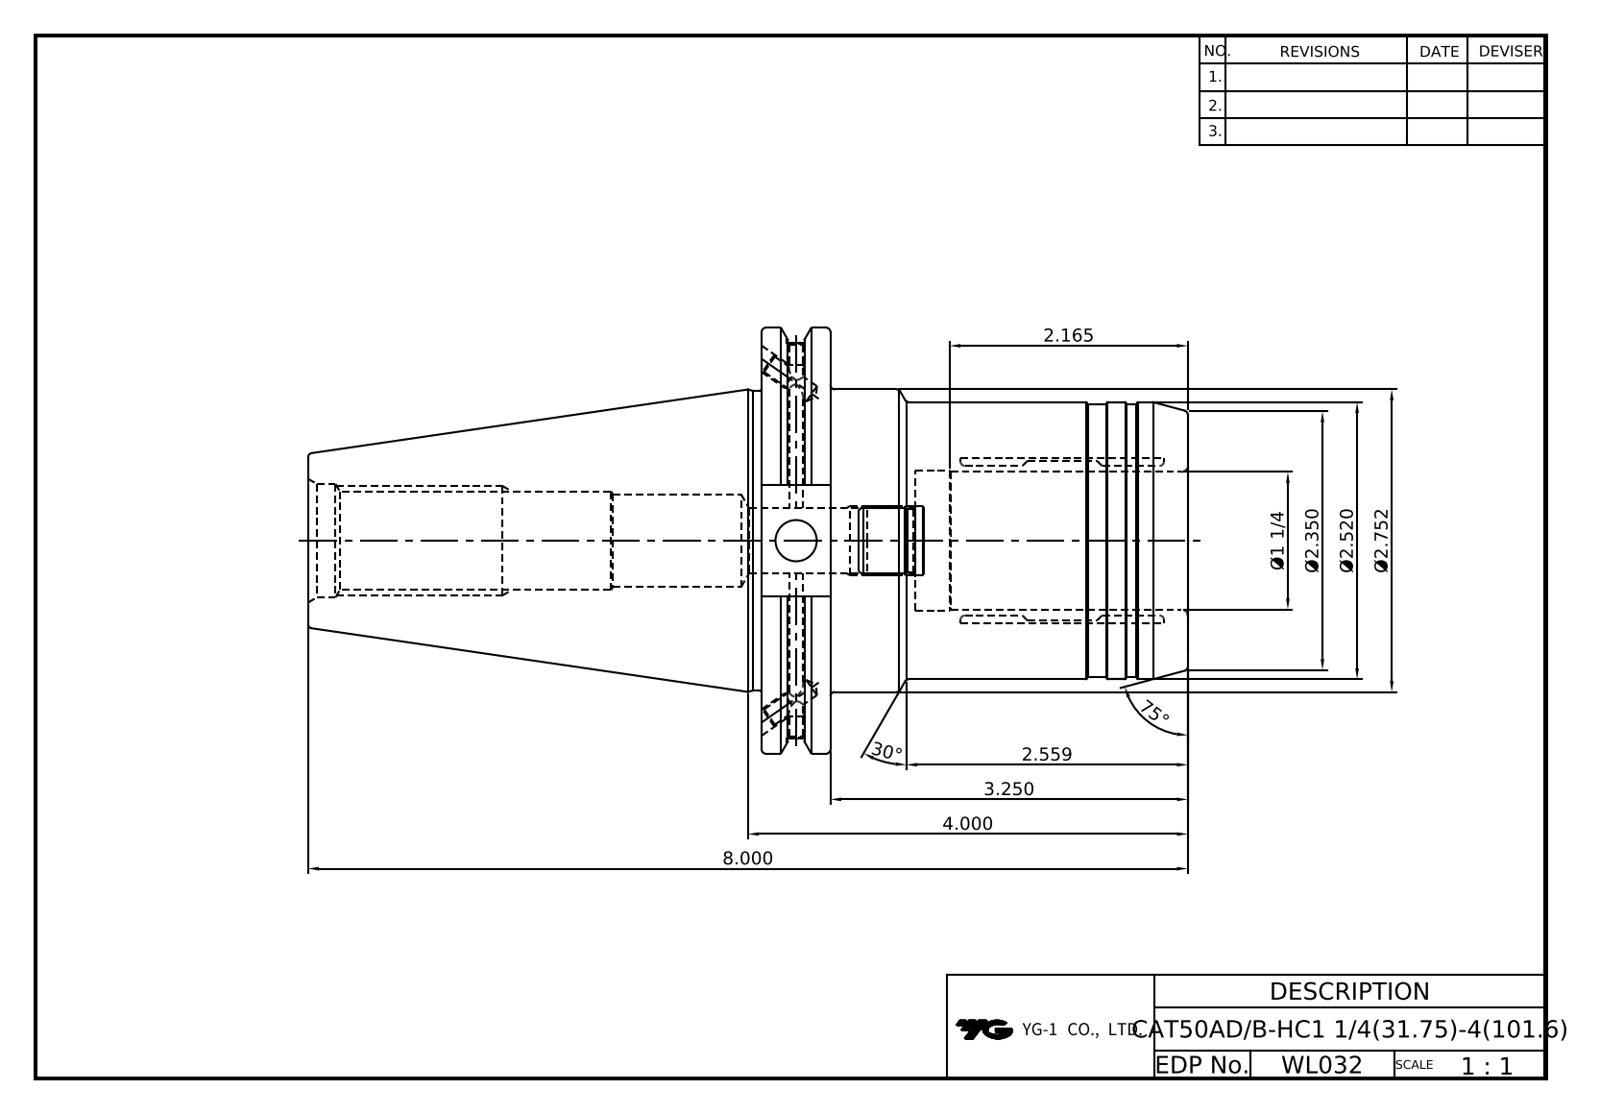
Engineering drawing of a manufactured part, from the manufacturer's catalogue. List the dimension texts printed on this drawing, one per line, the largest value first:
75°
30°
8.000
4.000
3.250
Ø2.752
2.559
Ø2.520
Ø2.350
2.165
Ø1 1/4
